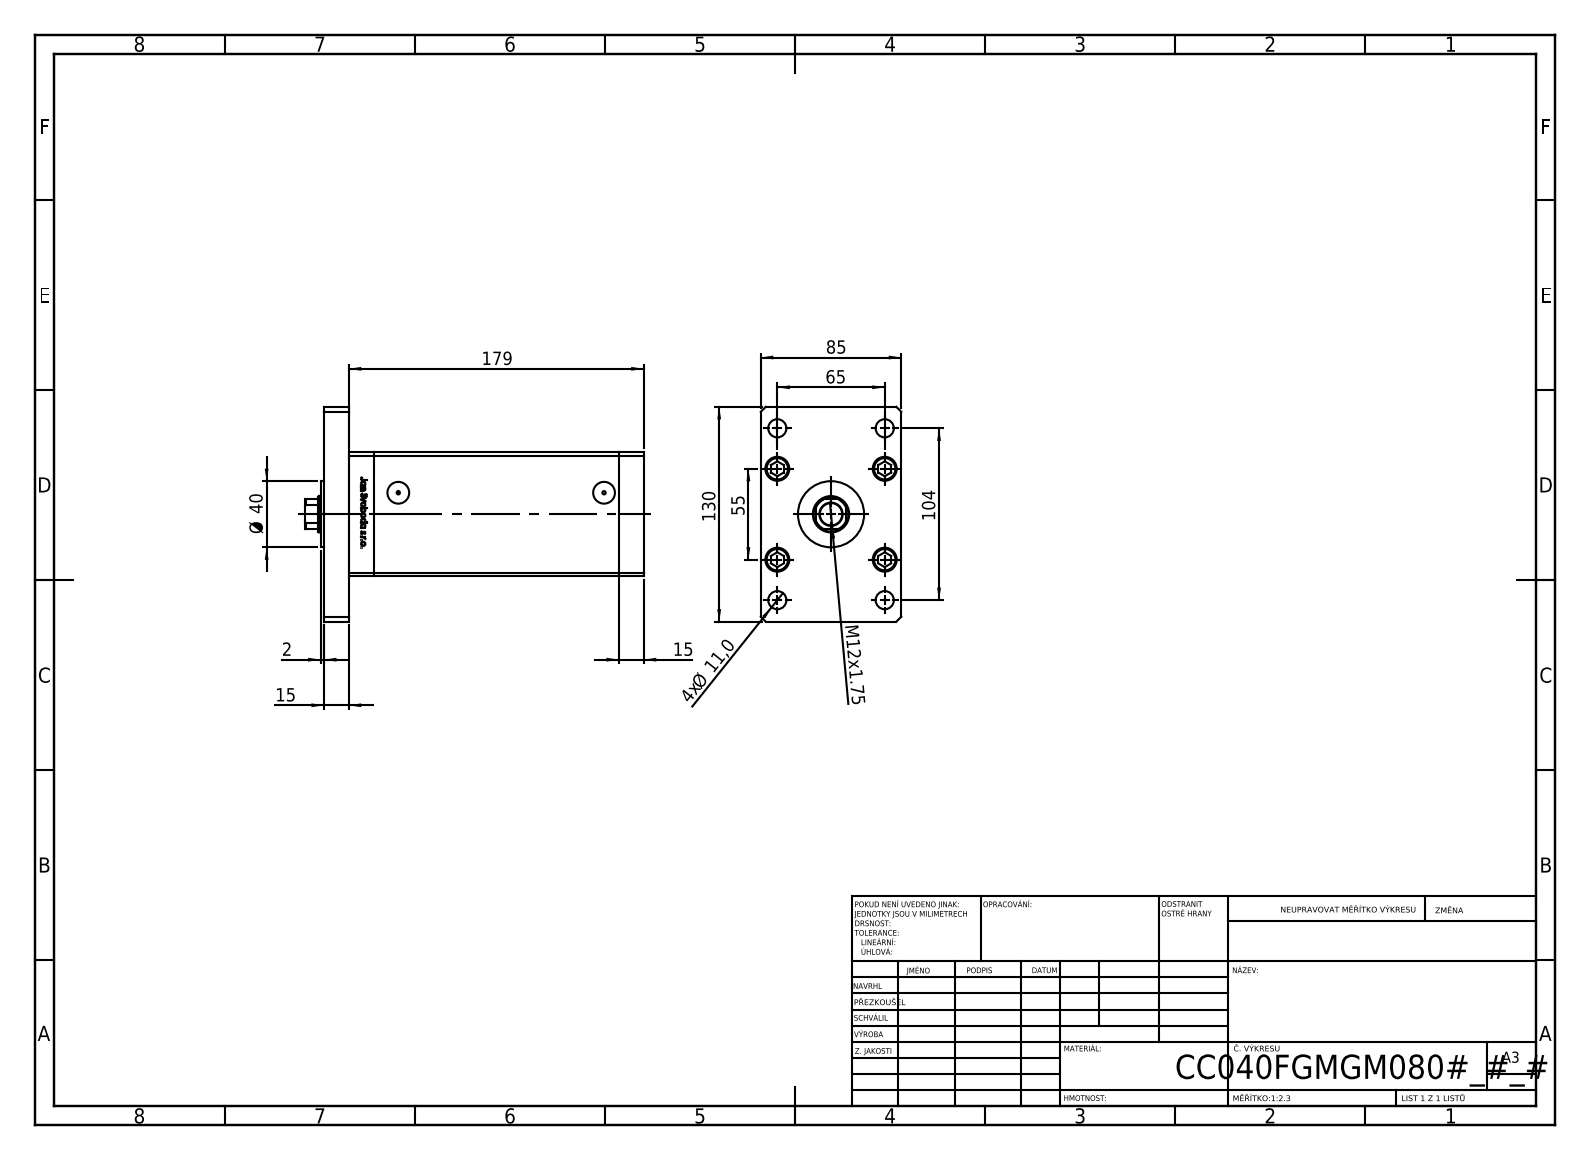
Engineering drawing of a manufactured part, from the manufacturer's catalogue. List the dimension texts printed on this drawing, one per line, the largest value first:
179
130
104
85
65
55
Ø 40
15
15
M12x1.75
4x Ø 11,0
2
